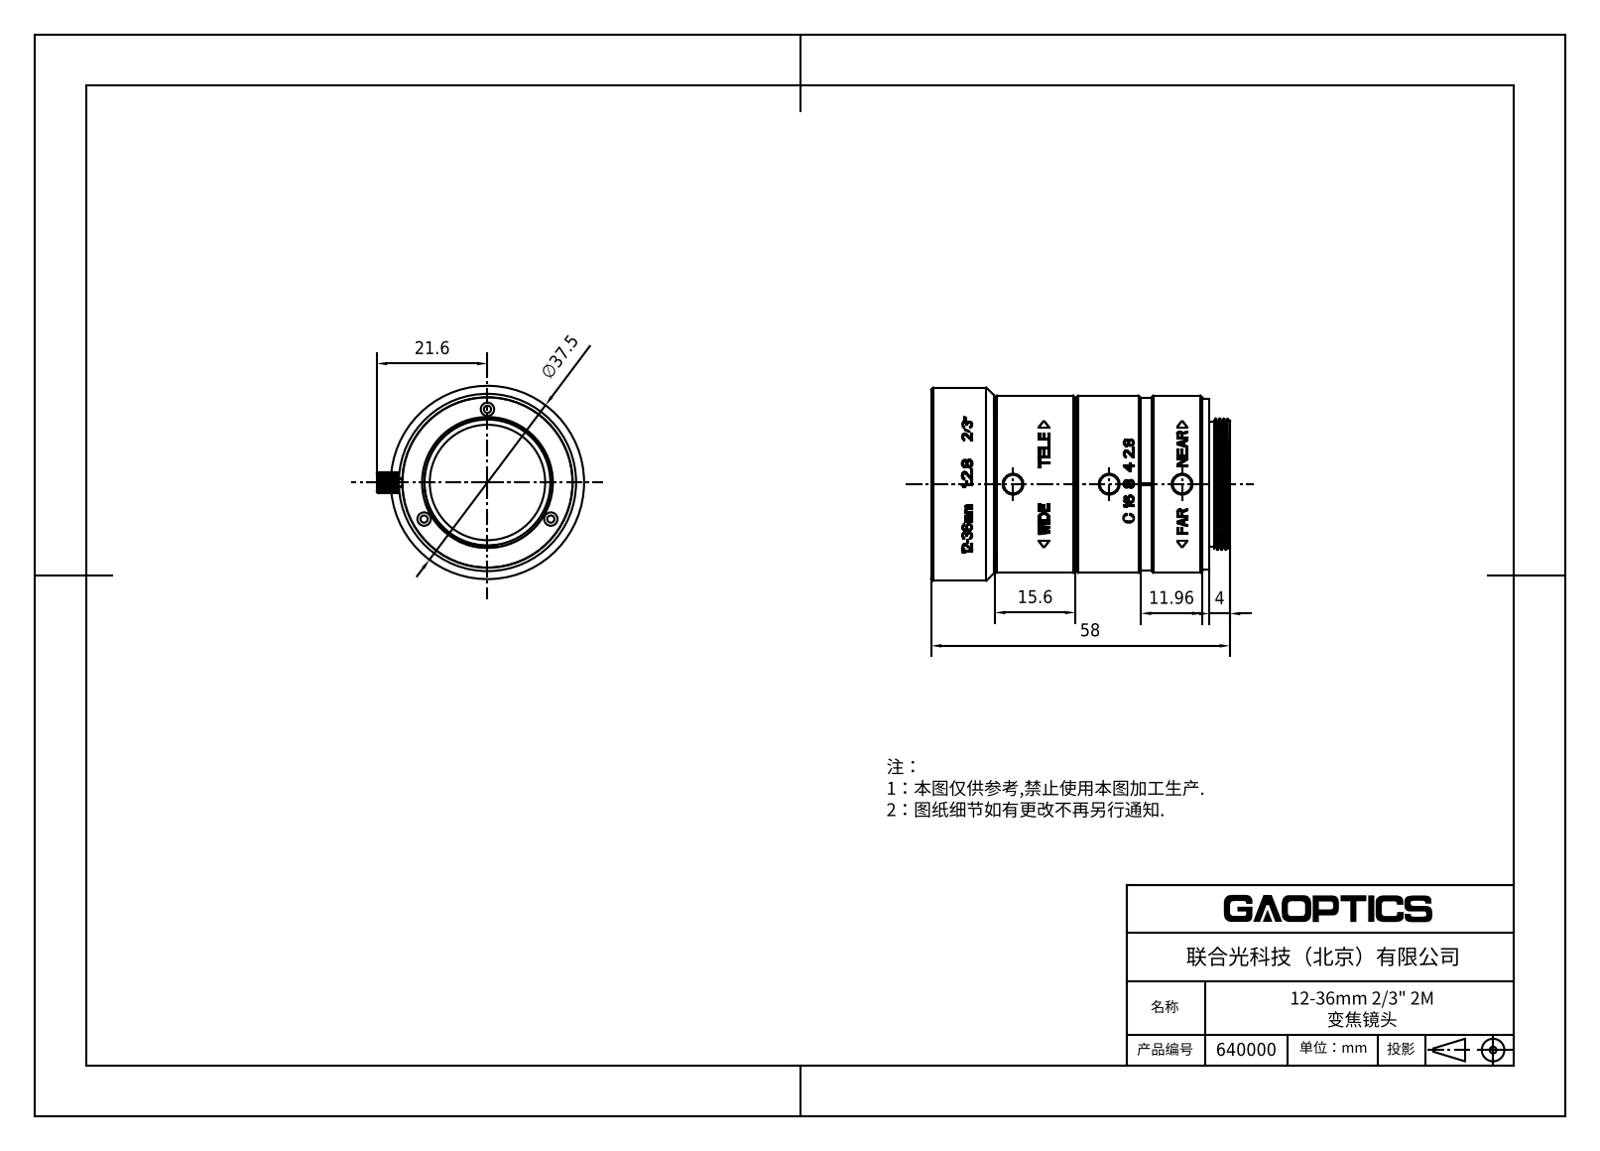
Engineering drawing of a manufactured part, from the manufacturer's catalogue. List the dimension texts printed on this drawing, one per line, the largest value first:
58
∅37.5
21.6
15.6
11.96
4
